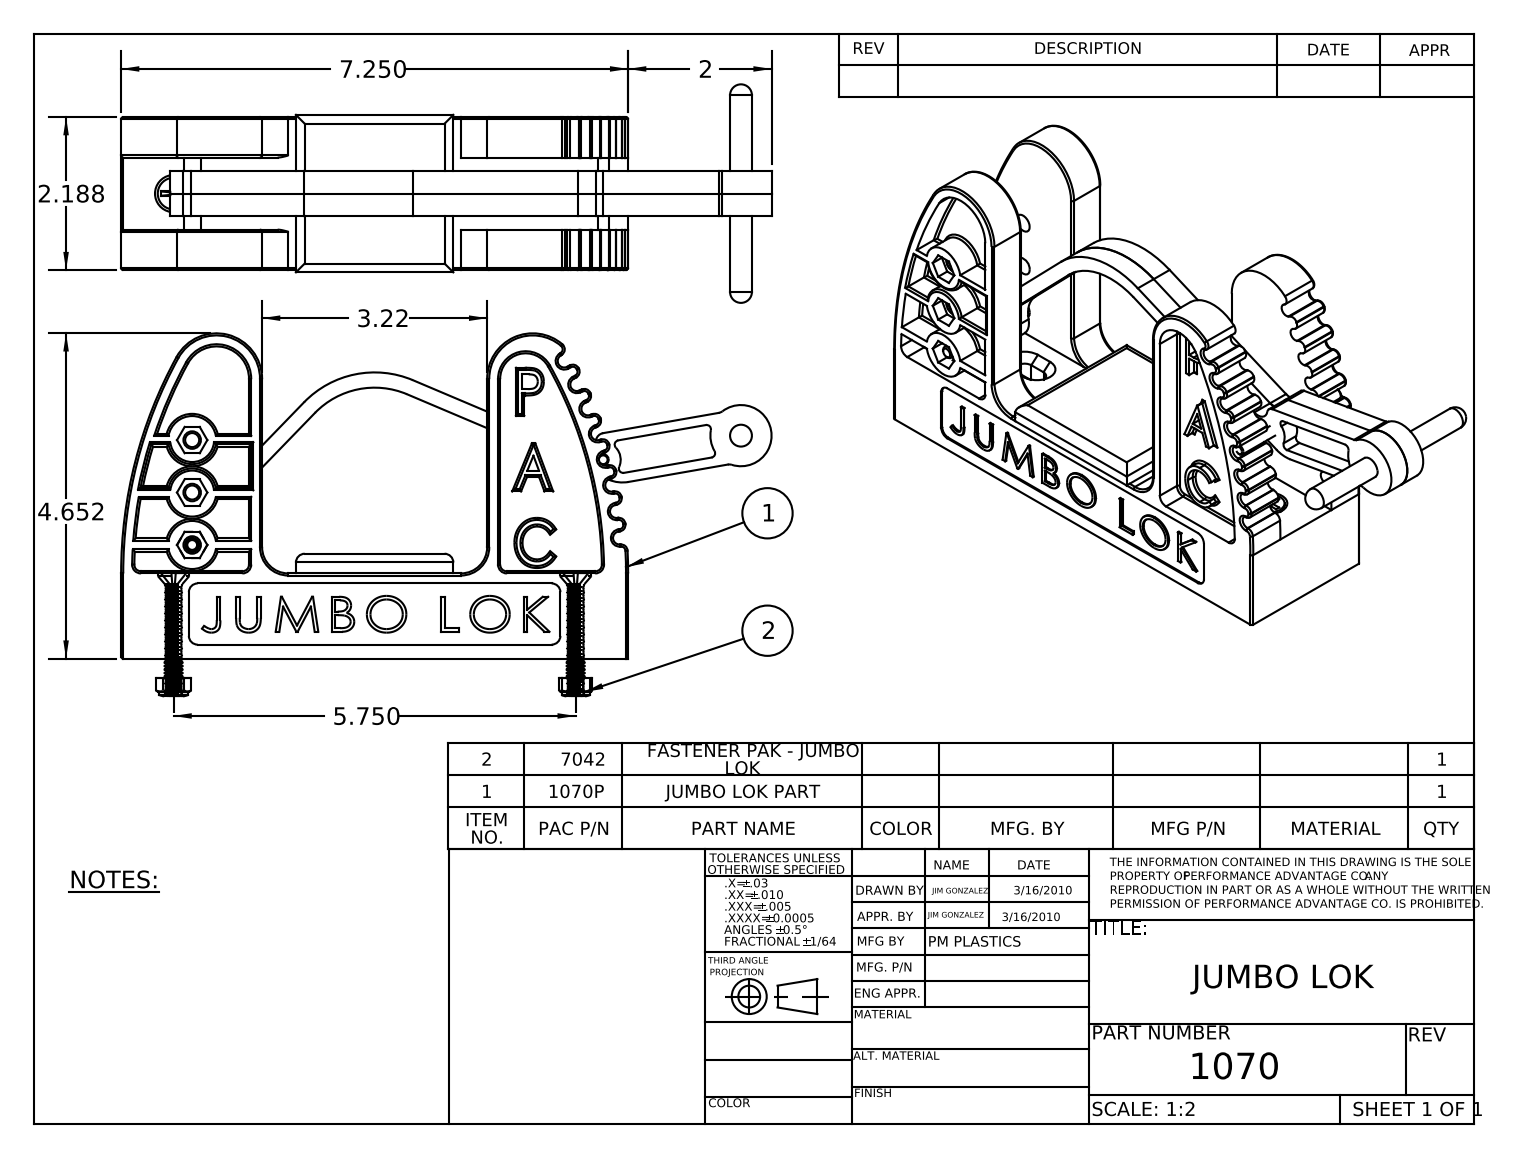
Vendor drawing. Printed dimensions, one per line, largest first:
7.250
5.750
4.652
3.22
2.188
2
